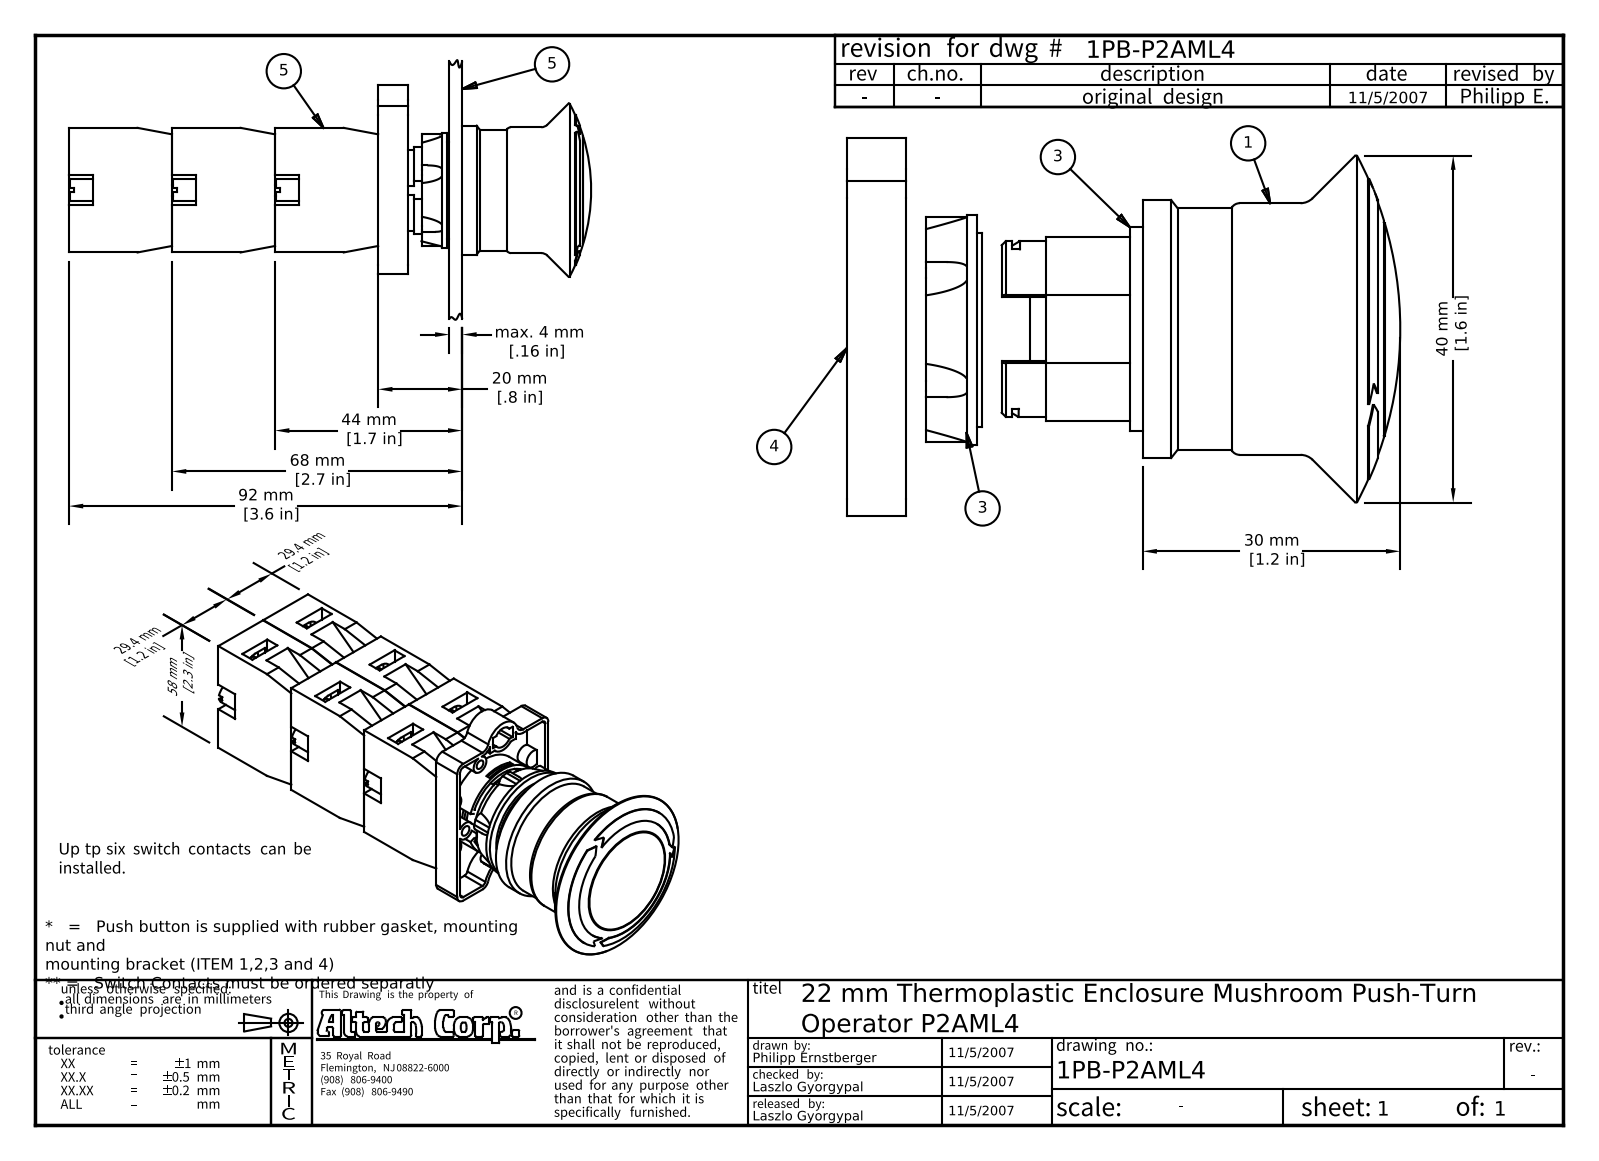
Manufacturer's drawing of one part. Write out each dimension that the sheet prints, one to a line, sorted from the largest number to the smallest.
92 mm [3.6 in]
68 mm [2.7 in]
58 mm [2.3 in]
44 mm [1.7 in]
40 mm [1.6 in]
30 mm [1.2 in]
29.4 mm [1.2 in]
29.4 mm [1.2 in]
20 mm [.8 in]
max. 4 mm [.16 in]
